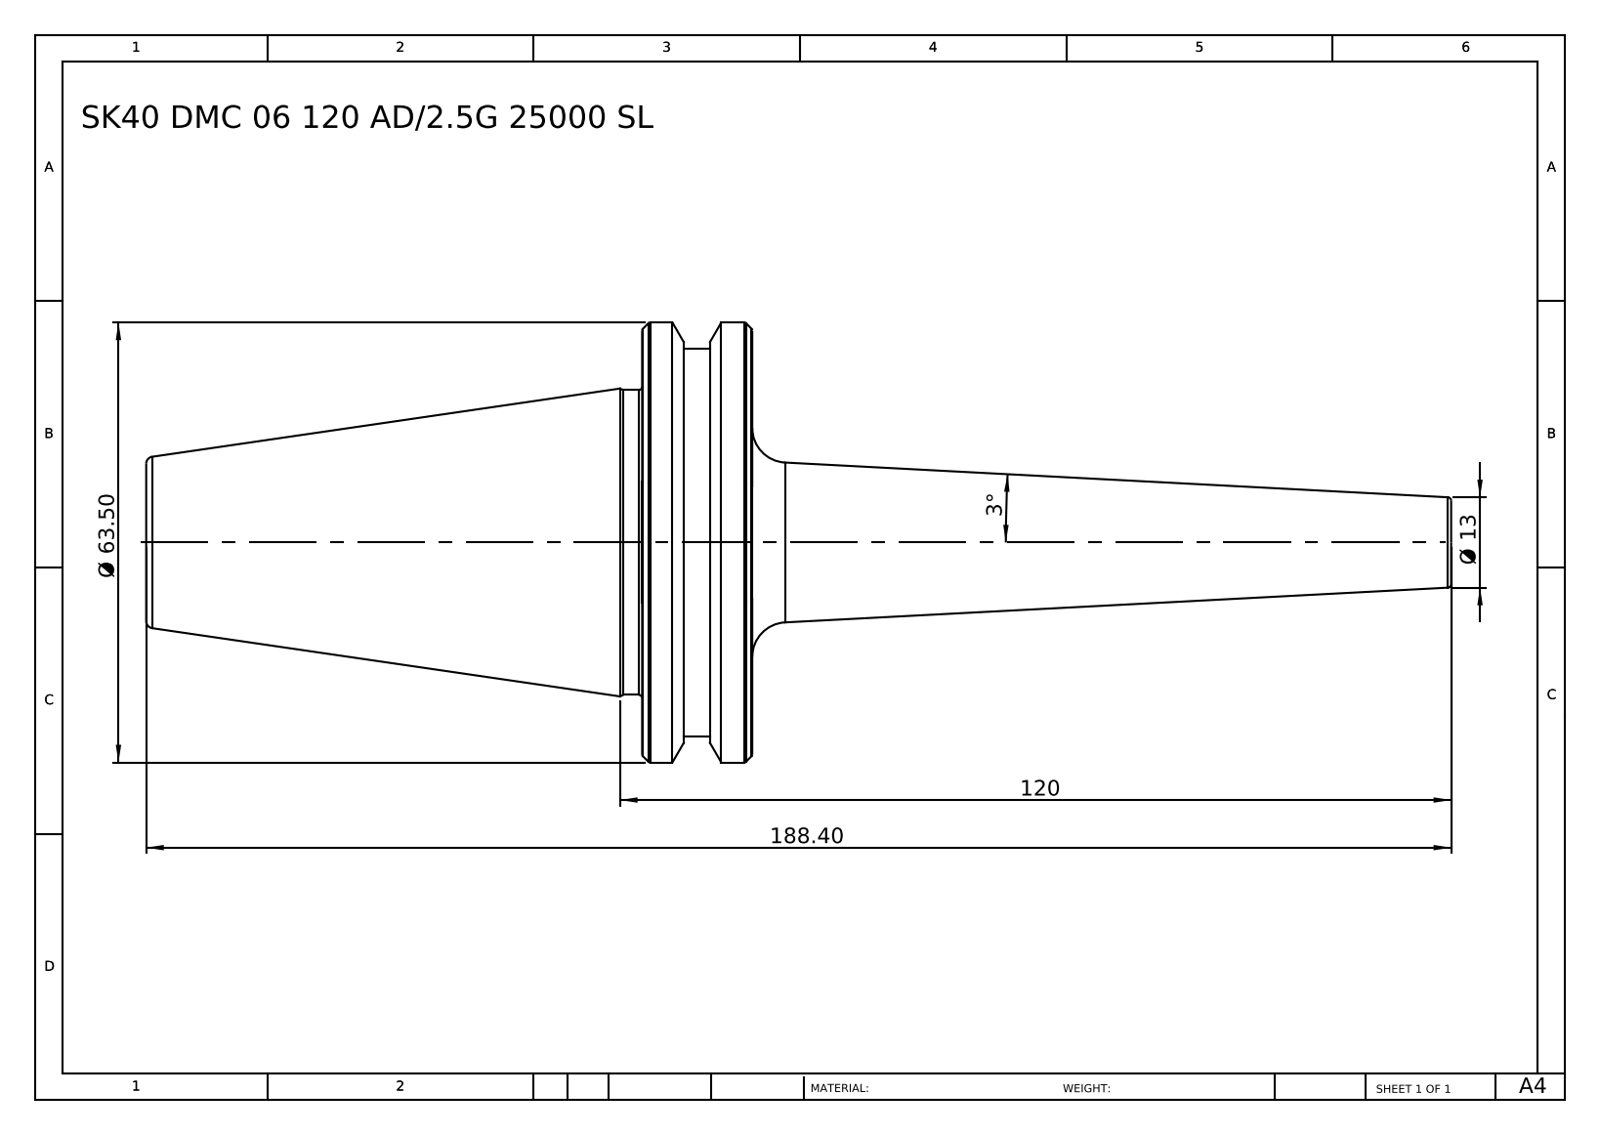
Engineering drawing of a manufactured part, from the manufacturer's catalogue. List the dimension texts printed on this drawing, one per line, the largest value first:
188.40
120
Ø 63.50
Ø 13
3°
